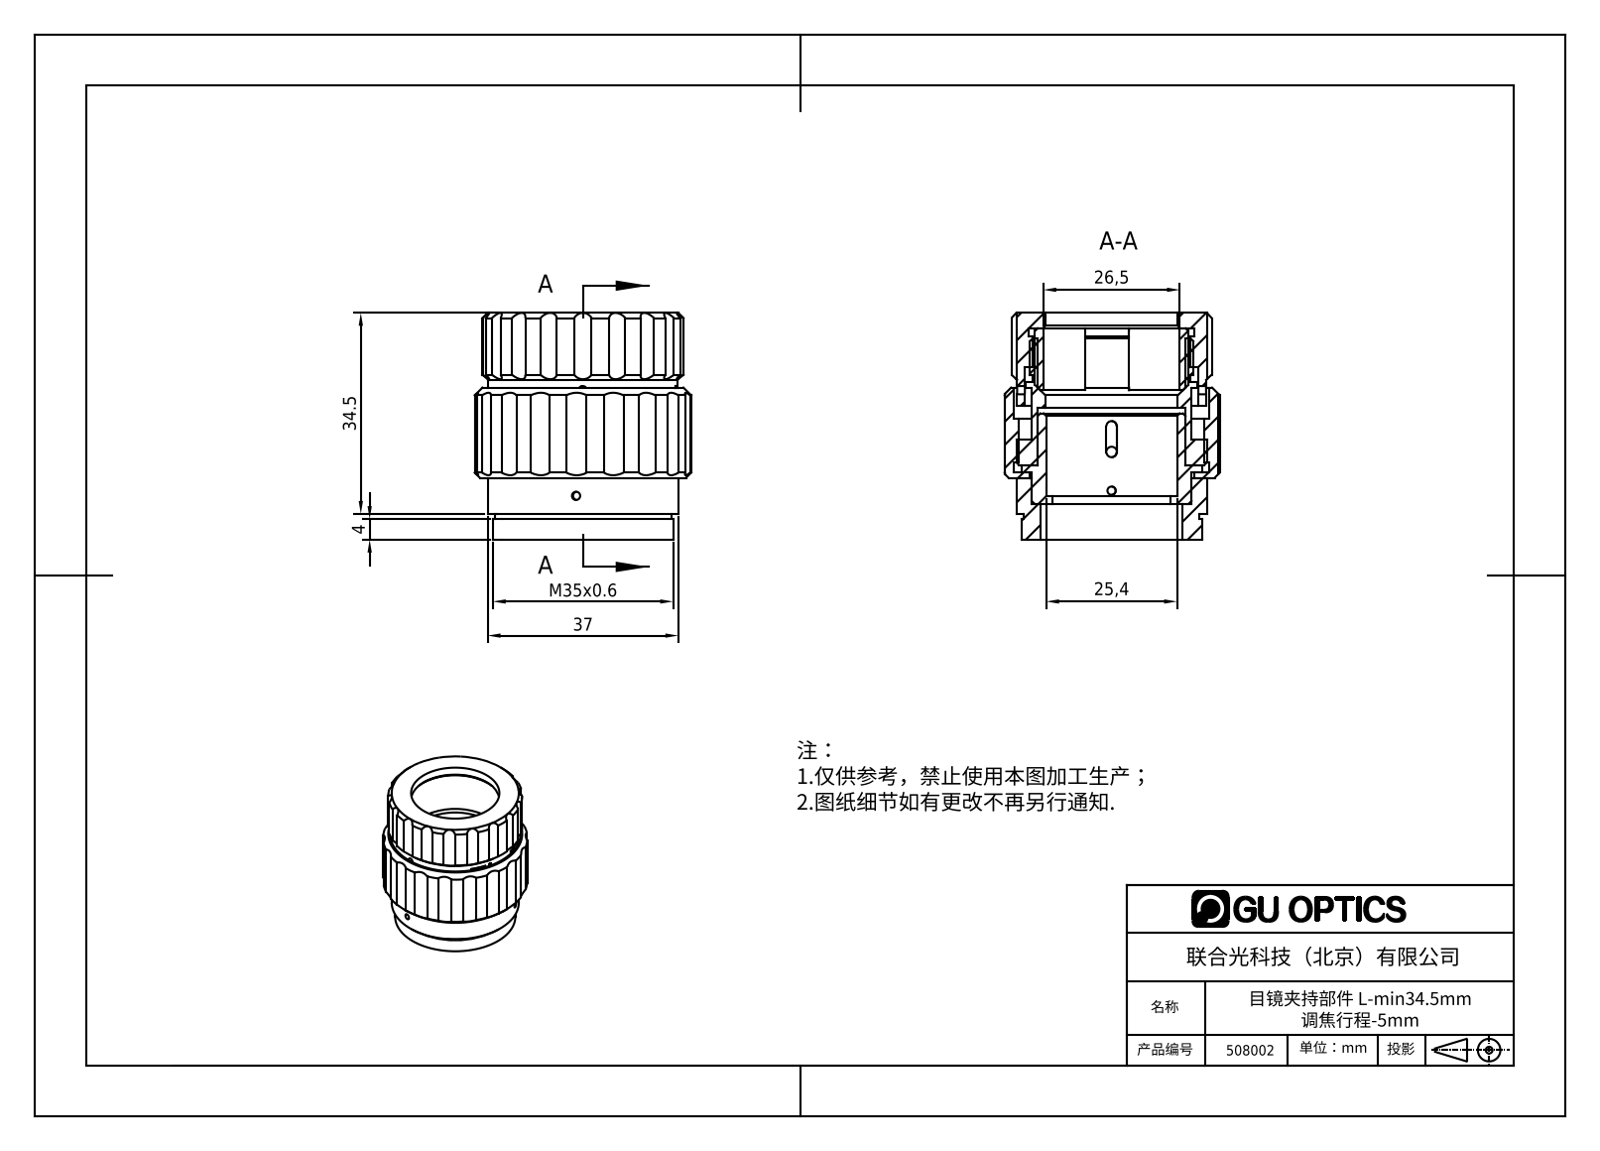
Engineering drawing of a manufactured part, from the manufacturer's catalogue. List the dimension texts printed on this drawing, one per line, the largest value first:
37
M35x0.6
34.5
26,5
25,4
4
